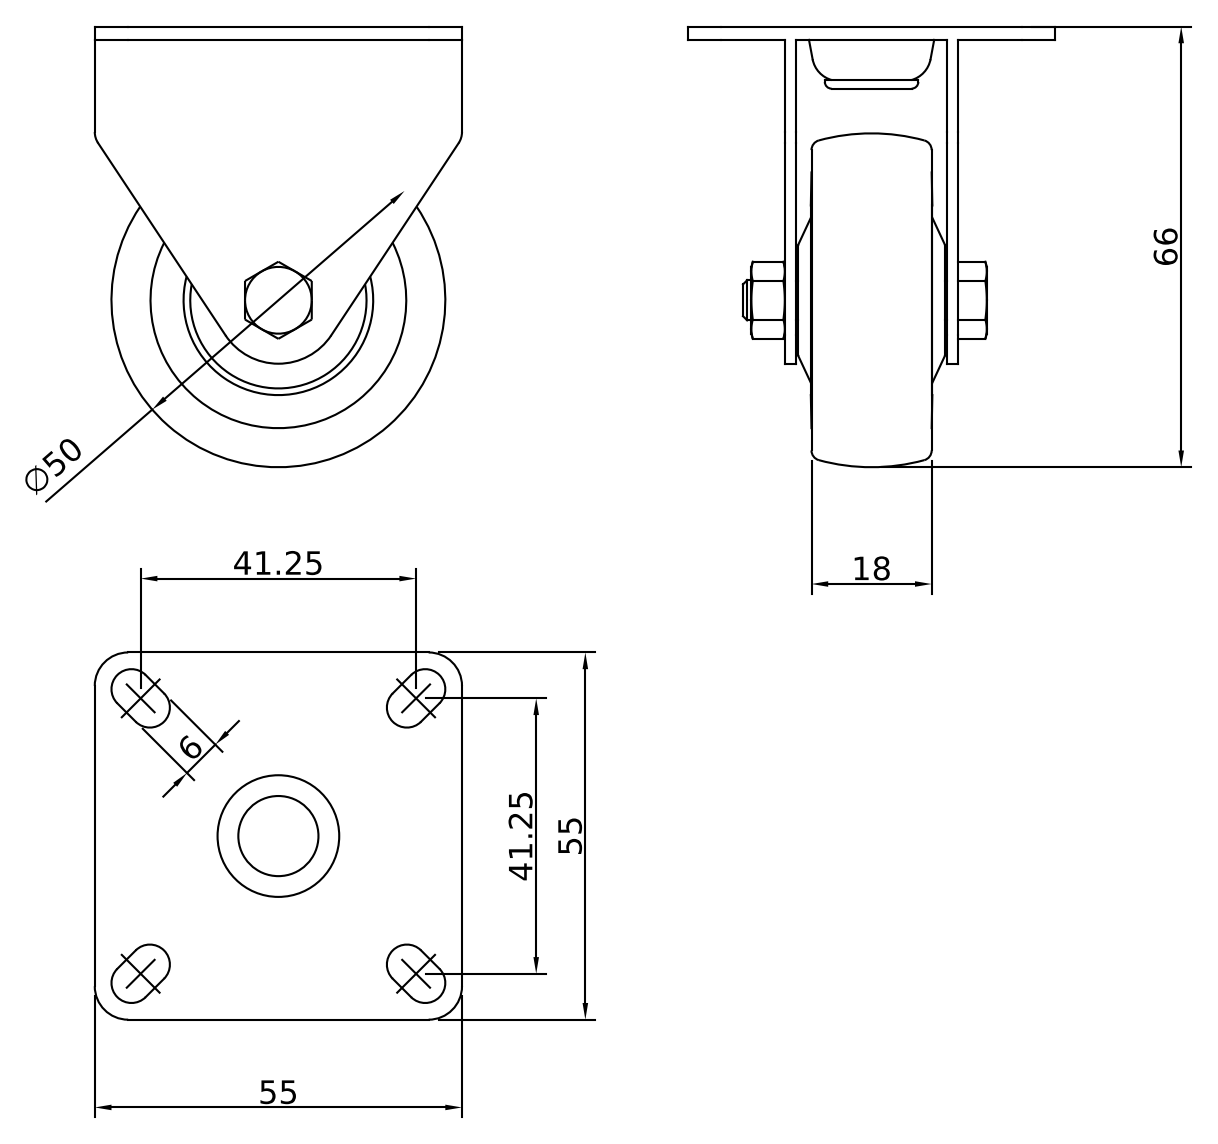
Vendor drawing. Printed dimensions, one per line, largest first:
66
55
55
∅50
41.25
41.25
18
6
